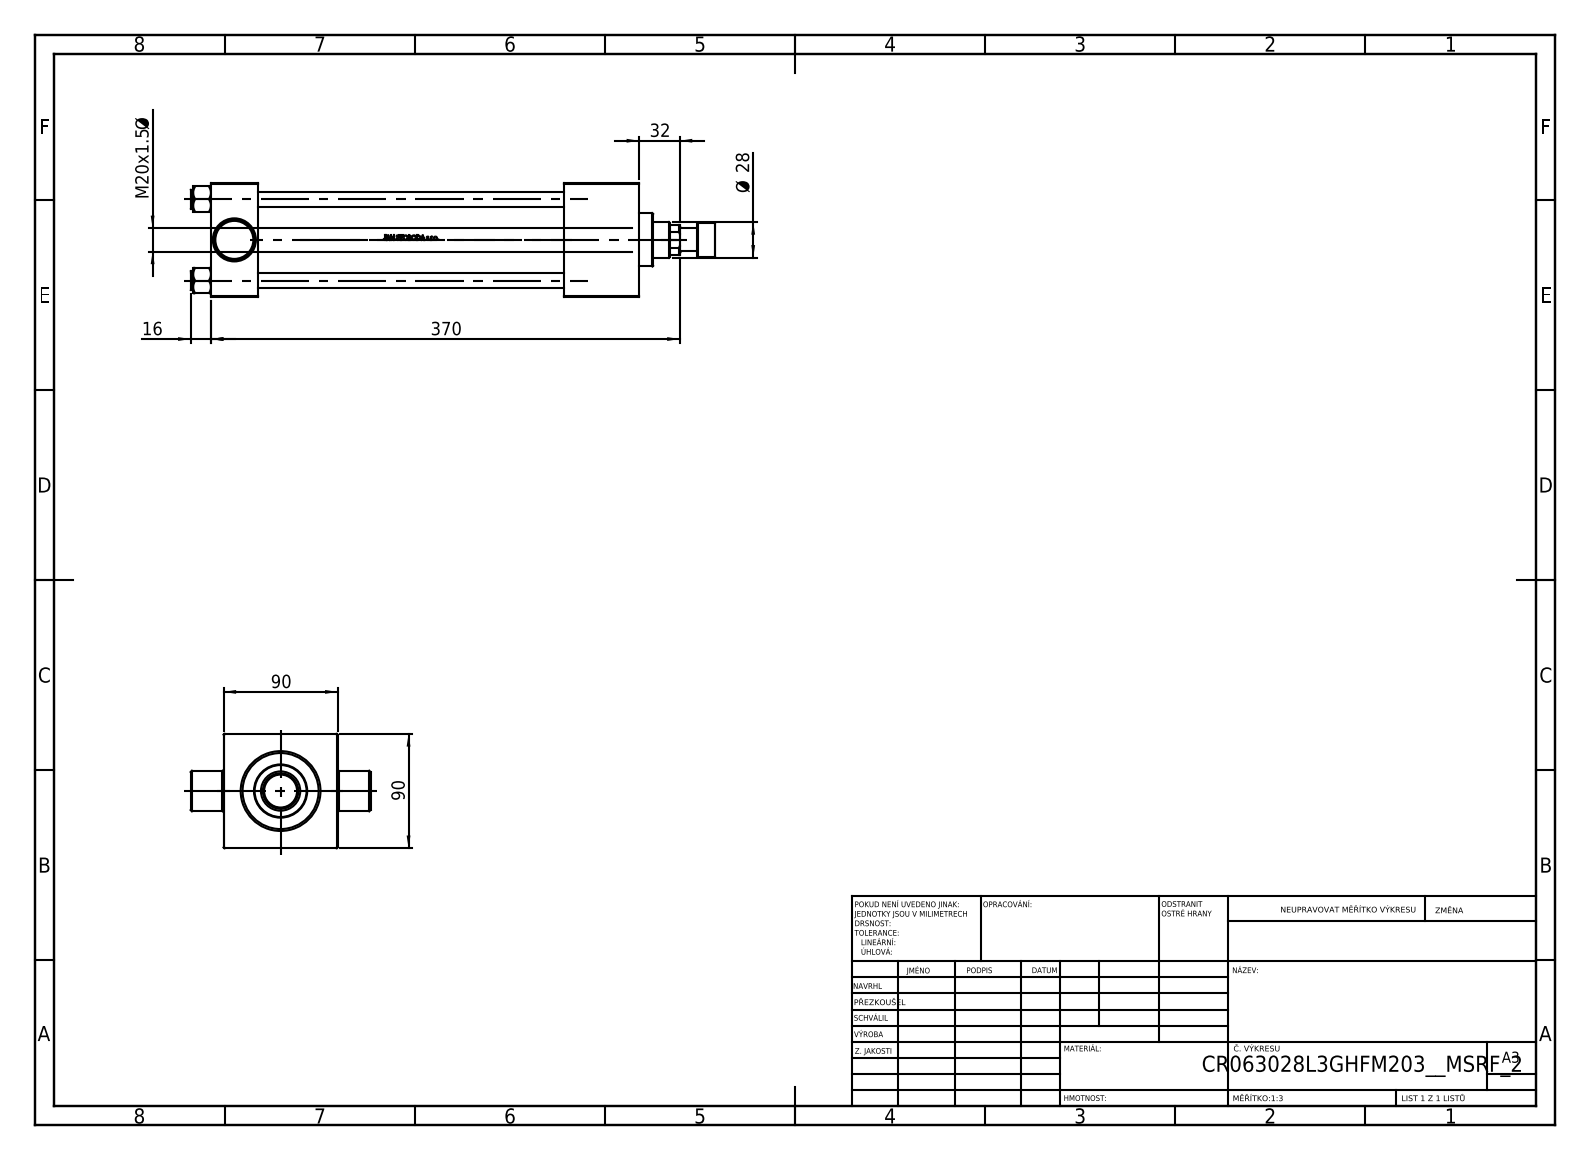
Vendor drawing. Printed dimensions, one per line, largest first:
370
90
90
32
Ø 28
M20x1.5 Ø
16
